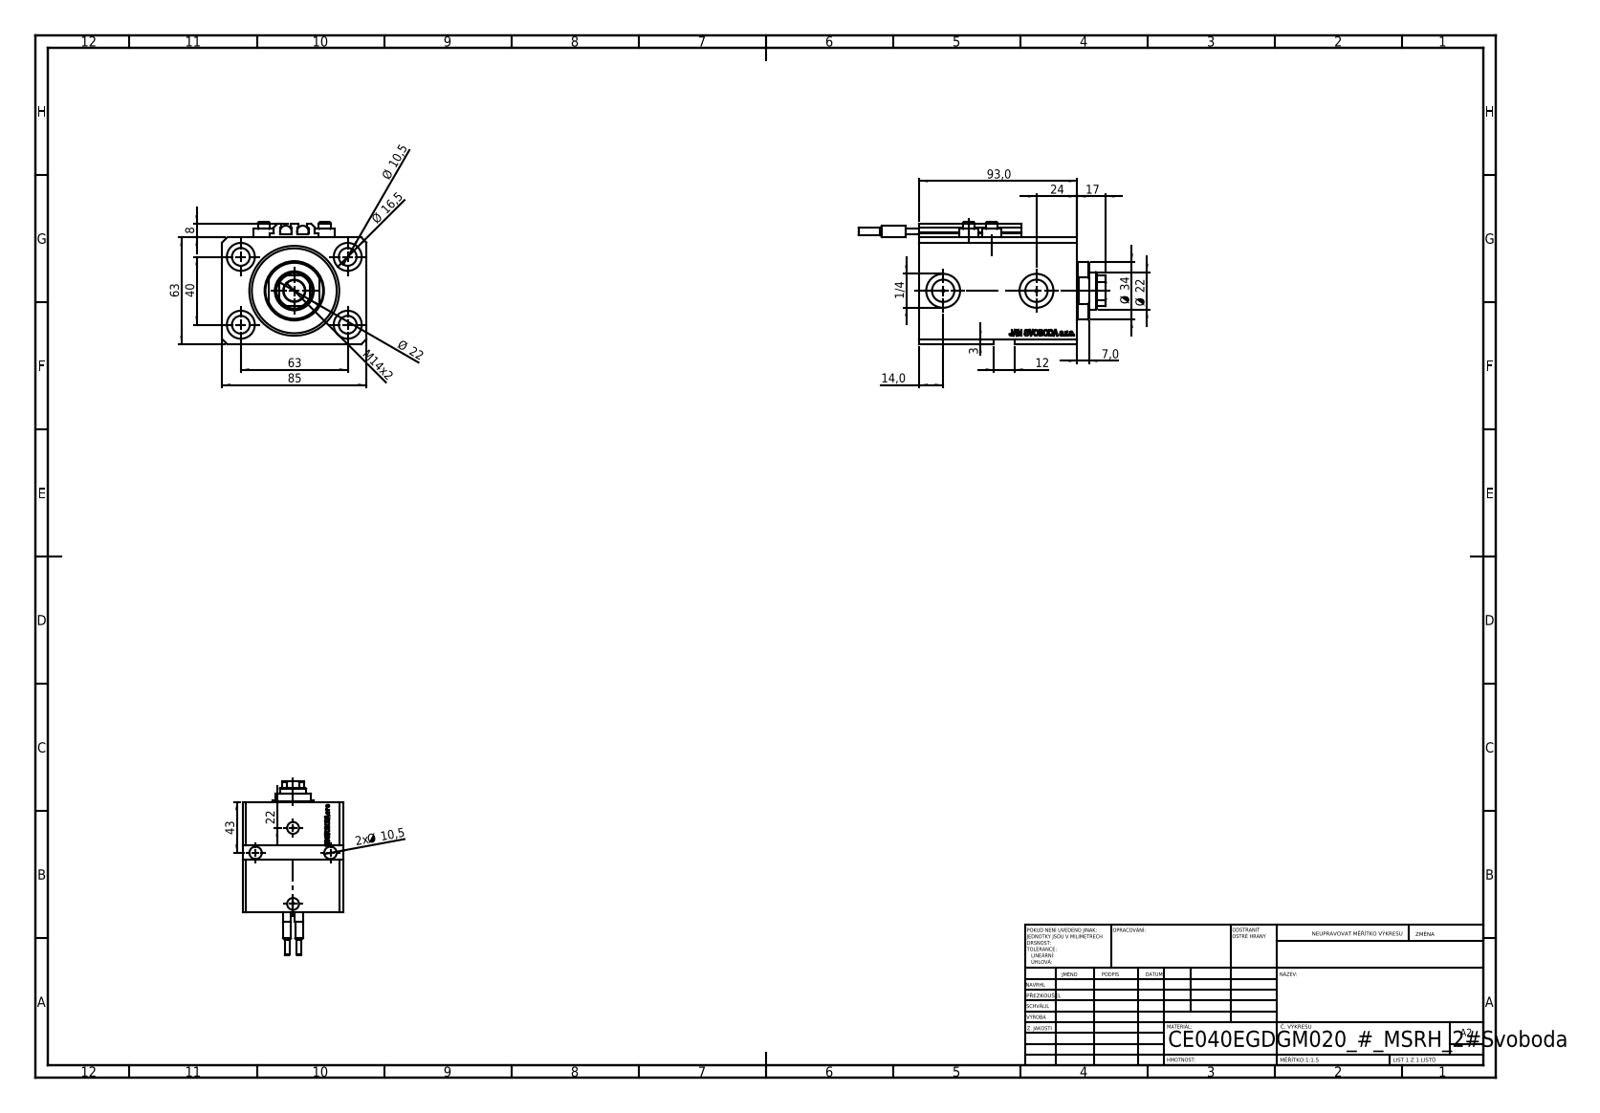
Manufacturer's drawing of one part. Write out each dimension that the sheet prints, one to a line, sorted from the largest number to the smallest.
93,0
85
63
63
43
40
Ø 34
24
Ø 22
Ø 22
22
17
Ø 16,5
M14x2
14,0
12
Ø 10,5
2x Ø 10,5
8
7,0
3
1/4
